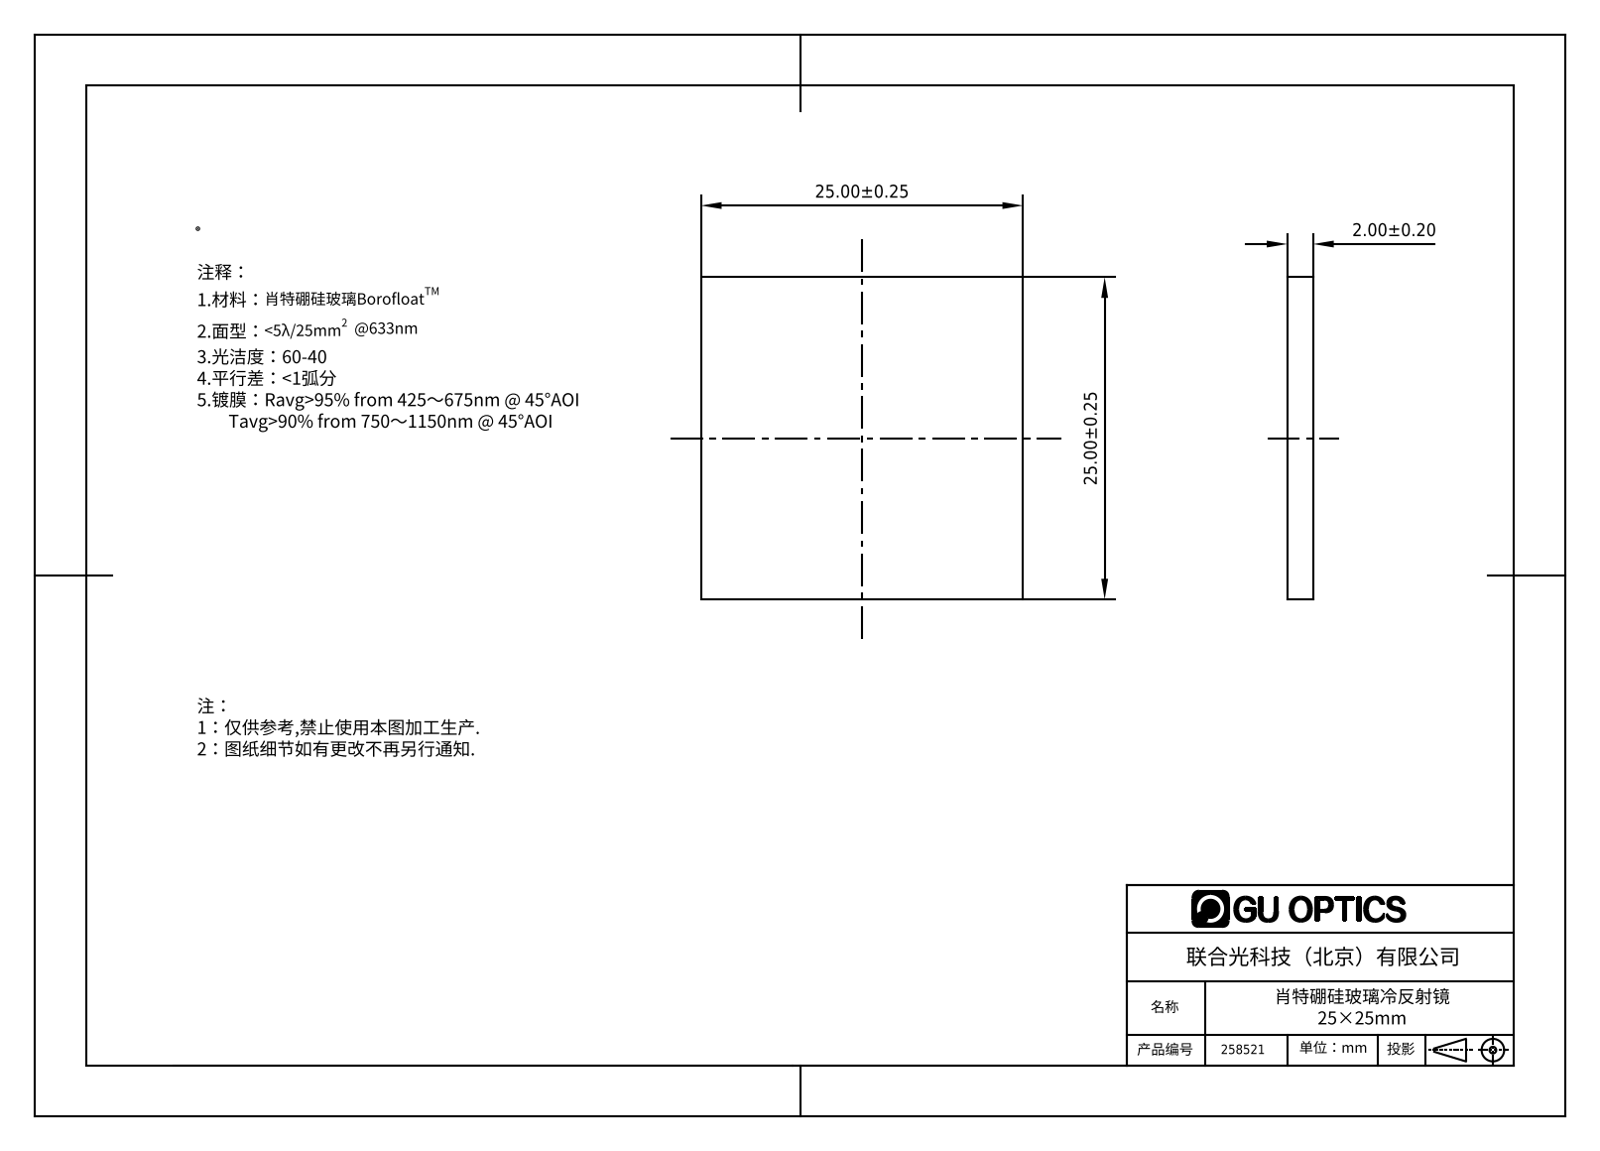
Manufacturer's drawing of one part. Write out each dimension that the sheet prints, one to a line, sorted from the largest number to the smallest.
25.00±0.25
25.00±0.25
2.00±0.20
